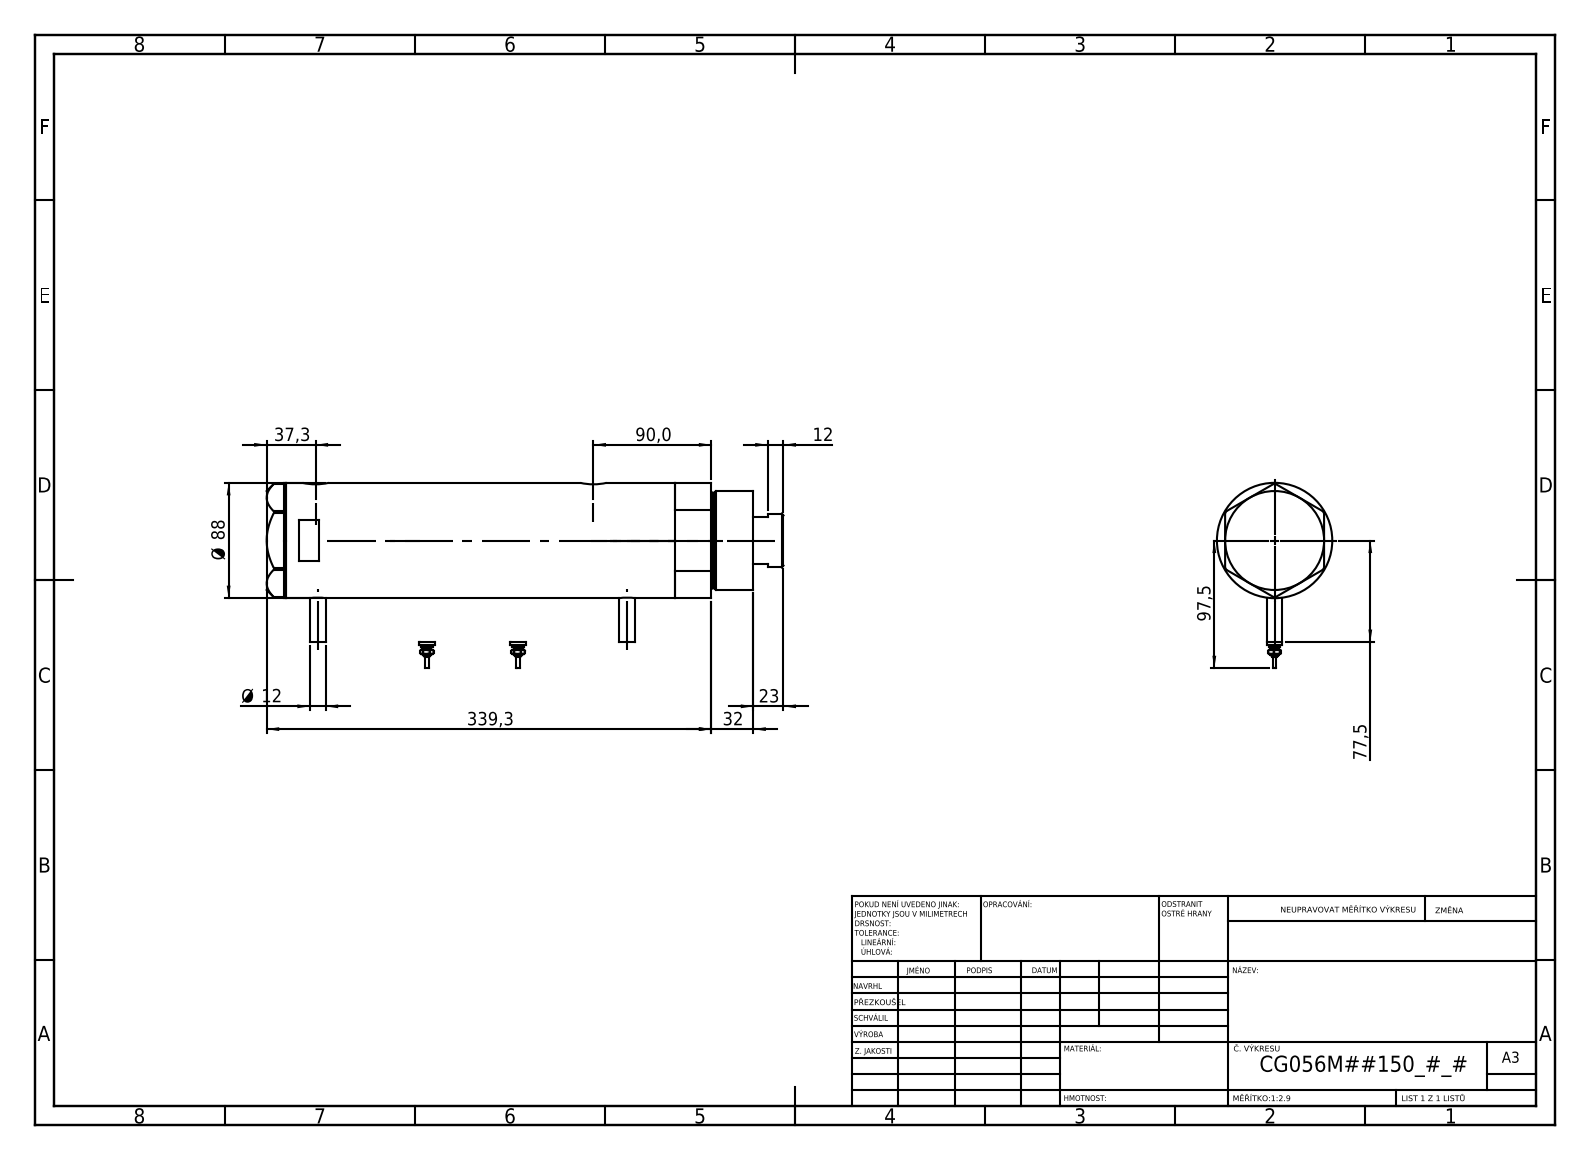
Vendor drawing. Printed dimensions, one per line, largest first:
339,3
97,5
90,0
Ø 88
77,5
37,3
32
23
12
Ø 12
